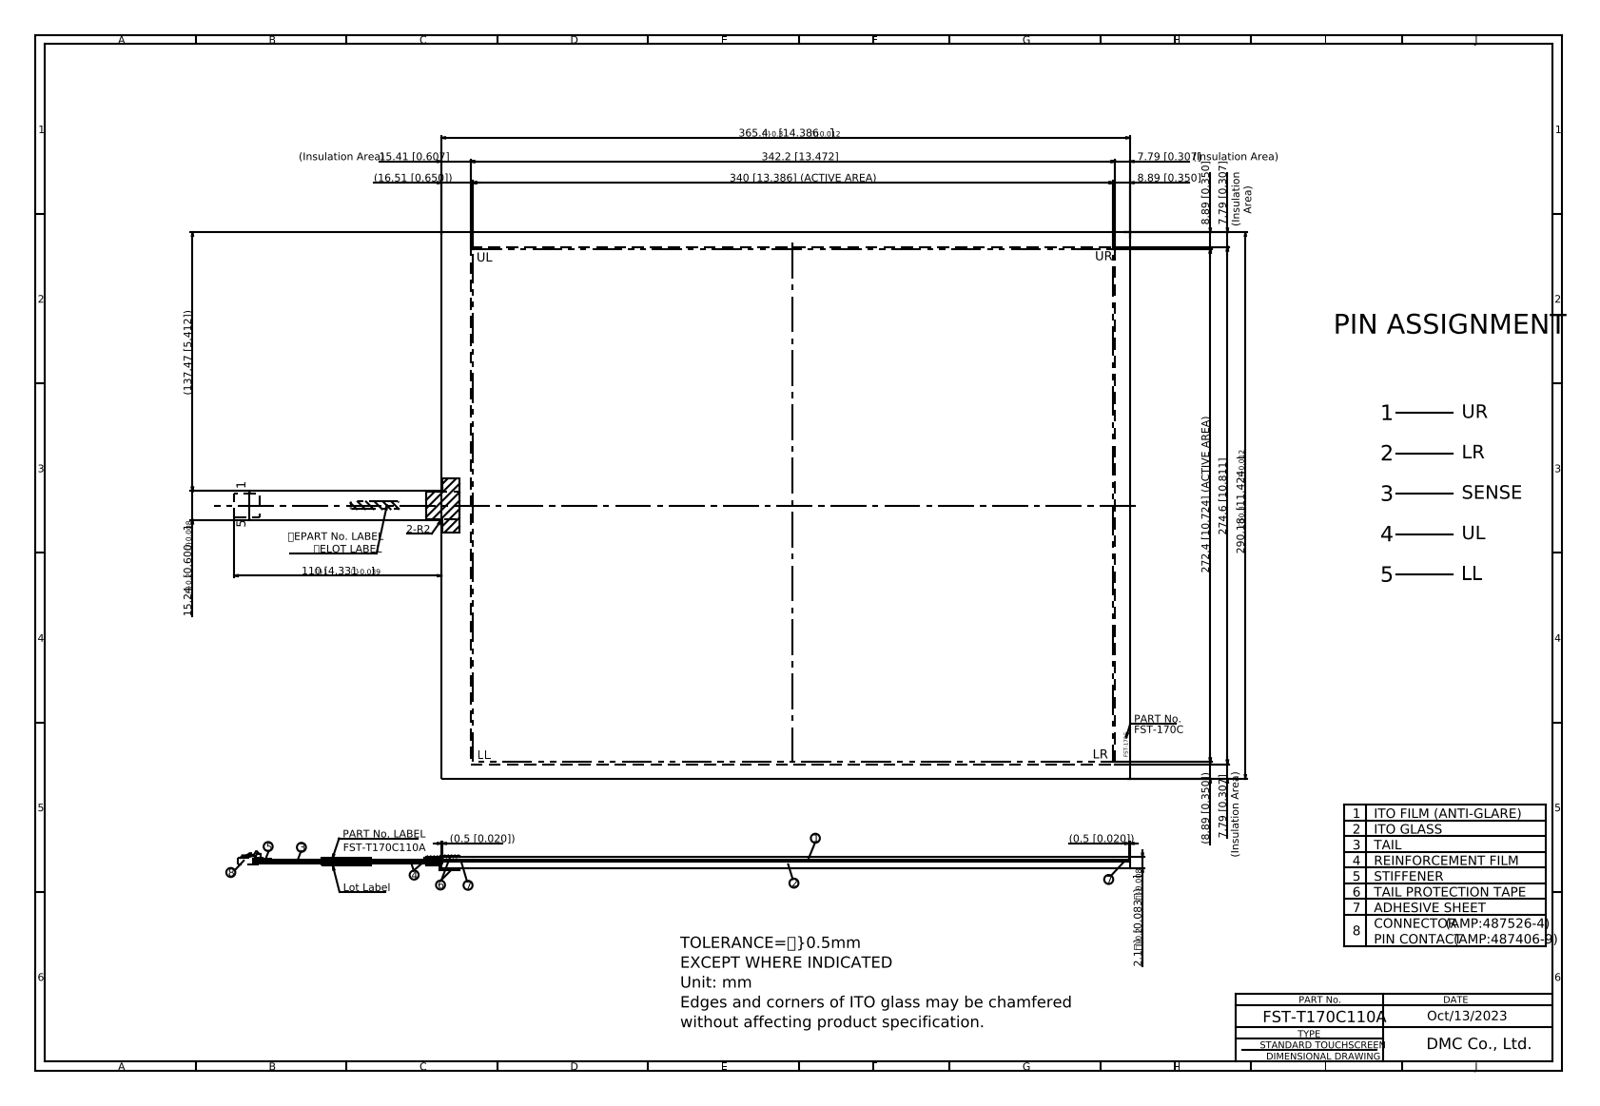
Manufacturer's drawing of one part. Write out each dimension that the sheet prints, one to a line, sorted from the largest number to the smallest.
365.40
342.2 [13.472]
340 [13.386] (ACTIVE AREA)
290.18
274.6 [10.811]
272.4 [10.724] (ACTIVE AREA)
(137.47 [5.412])
110.00
(16.51 [0.650])
15.41 [0.607]
15.24
(8.89 [0.350])
8.89 [0.350]
8.89 [0.350]
7.79 [0.307]
7.79 [0.307]
7.79 [0.307]
2.1?}{\H0.75x;?}0.2} [0.083?}{\H0.75x;?}0.008}]
(0.5 [0.020])
(0.5 [0.020])
